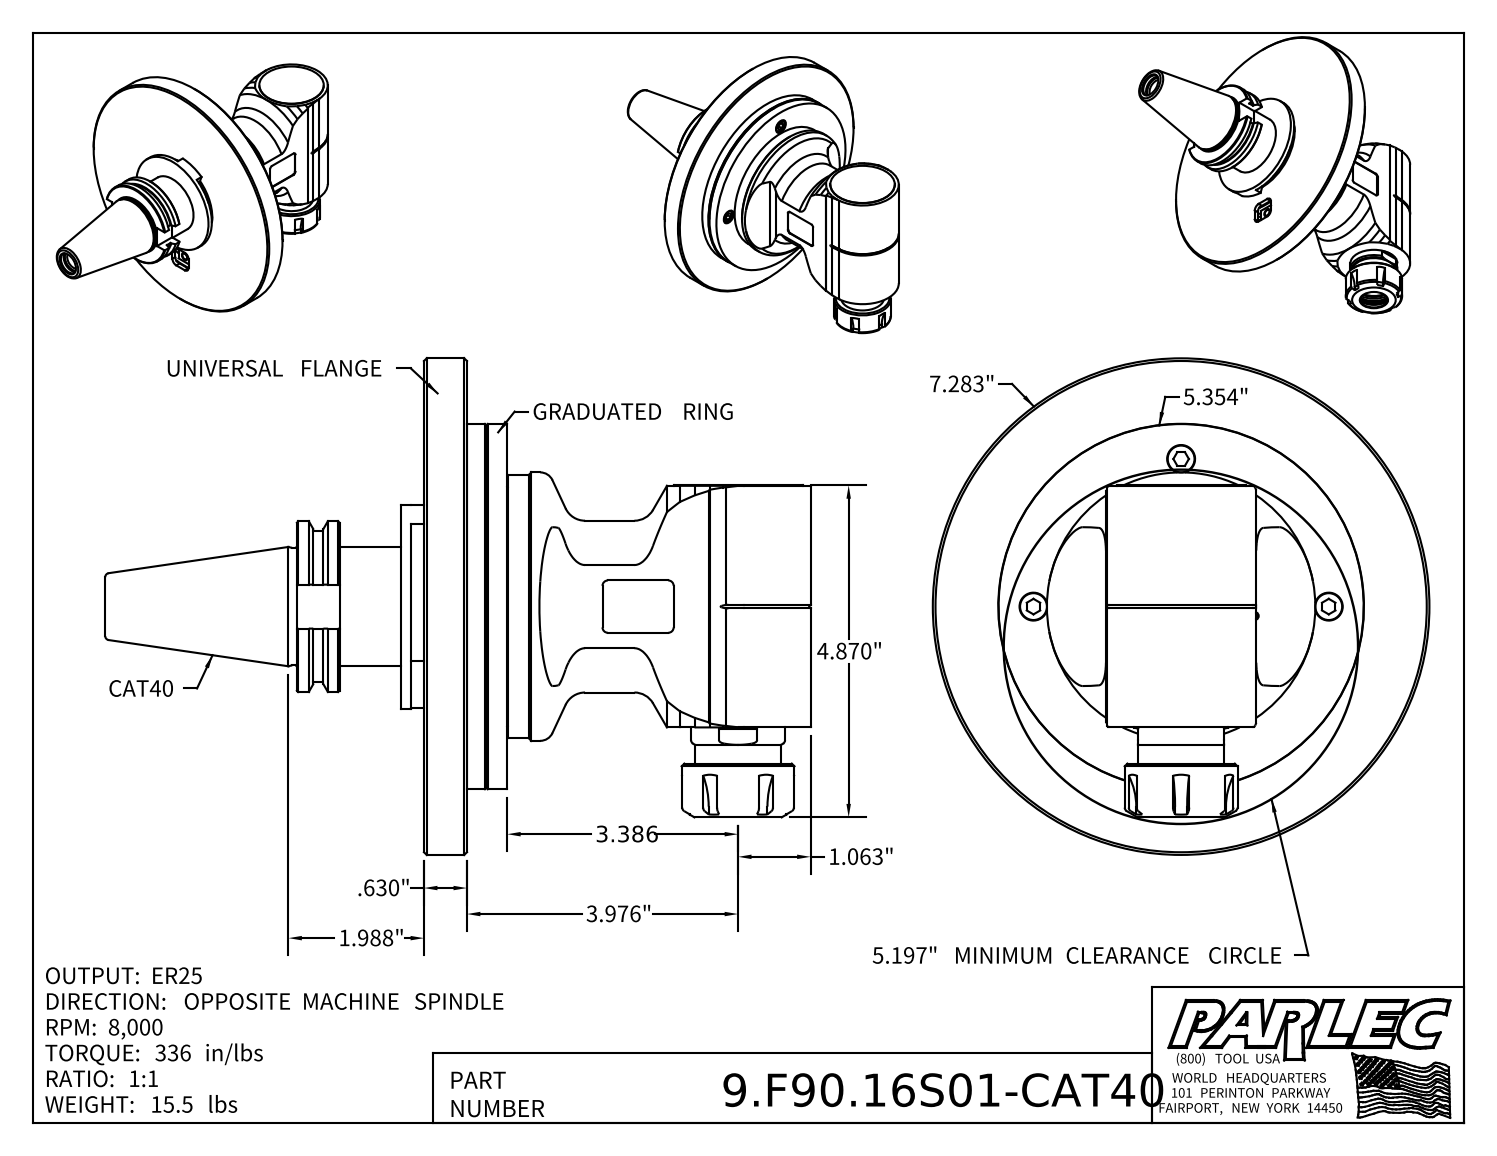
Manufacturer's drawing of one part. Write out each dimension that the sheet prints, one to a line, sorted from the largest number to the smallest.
4.870"
3.976"
3.386
1.988"
1.063"
.630"
